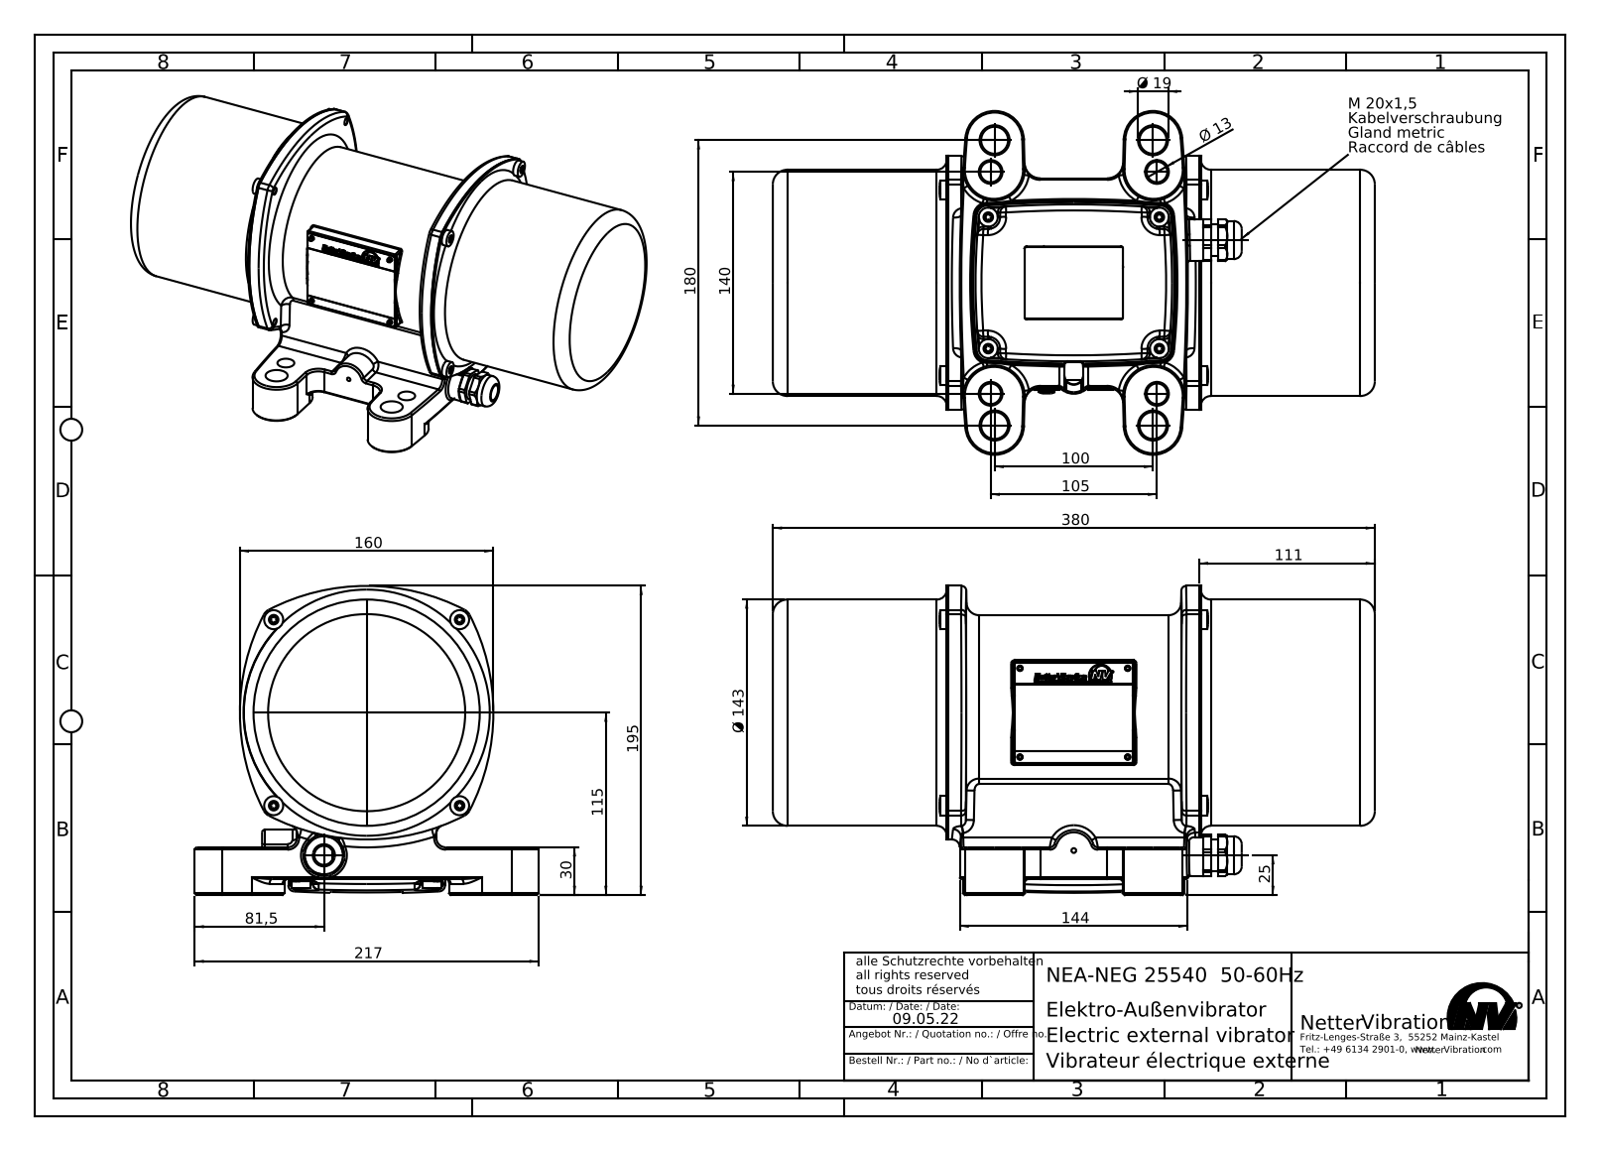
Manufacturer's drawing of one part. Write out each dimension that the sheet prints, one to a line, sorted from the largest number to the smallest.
380
217
195
180
160
144
Ø 143
140
115
111
105
100
81,5
30
25
Ø 19
Ø 13
